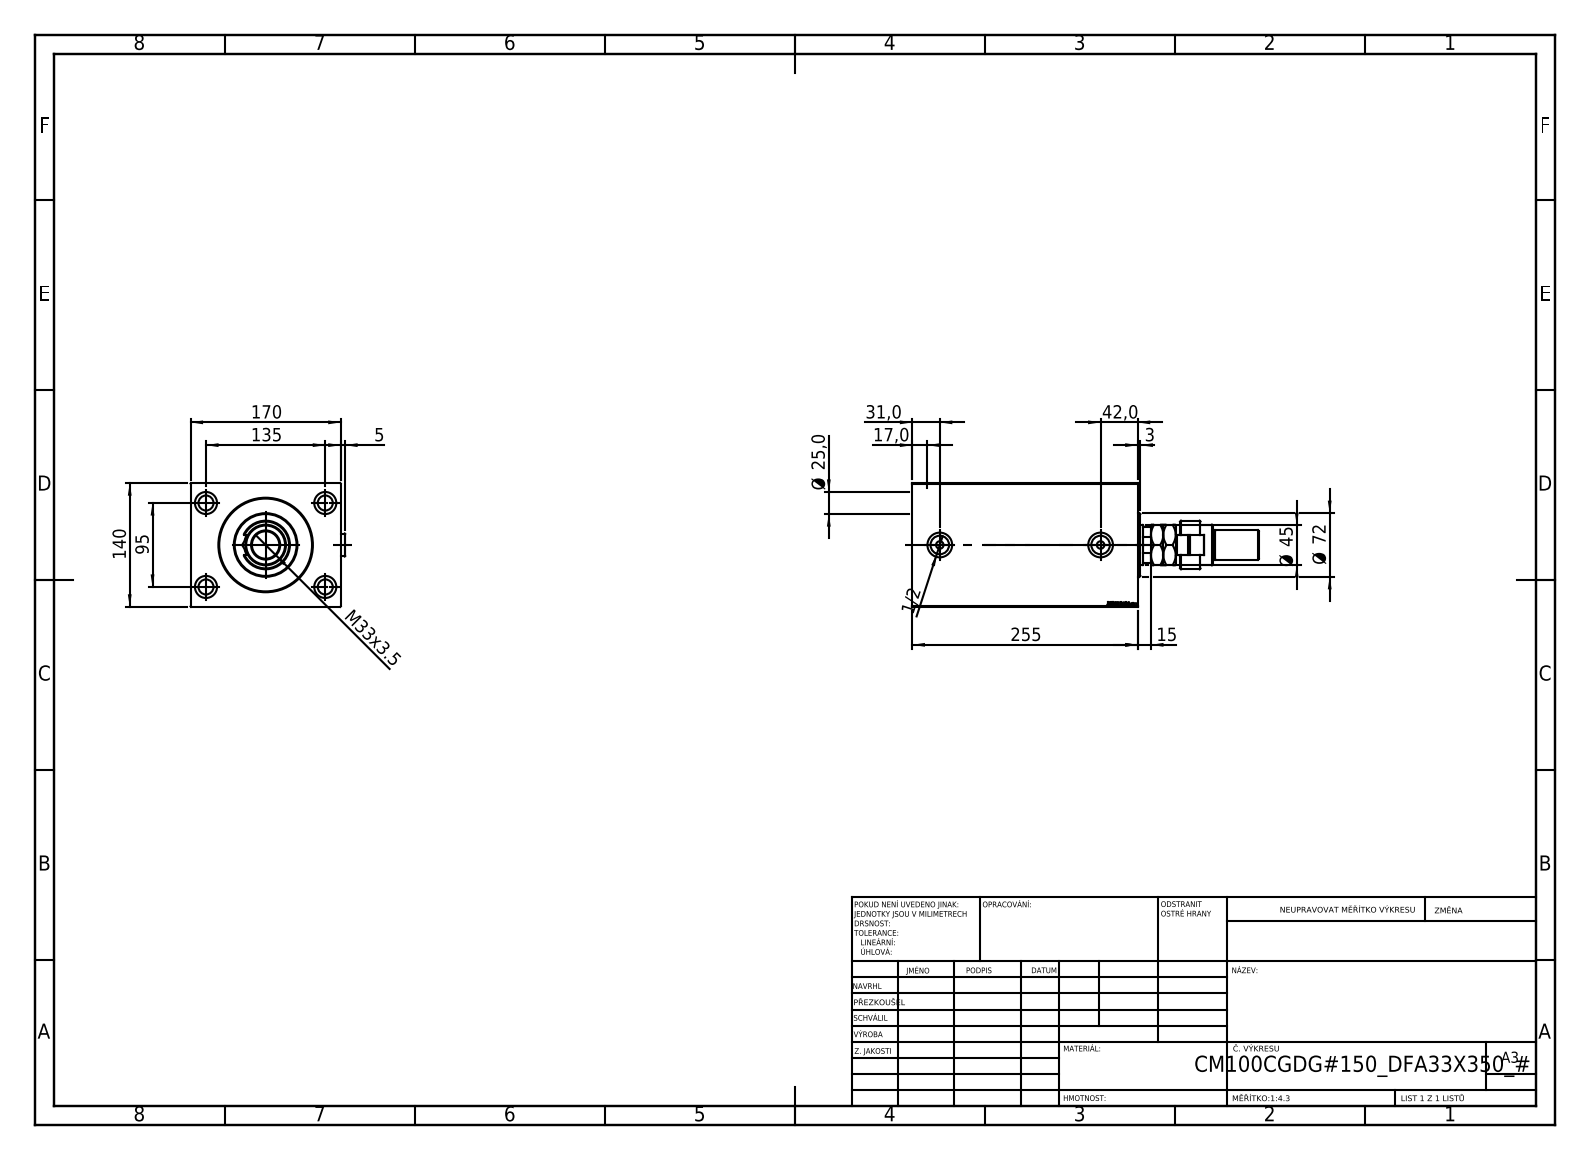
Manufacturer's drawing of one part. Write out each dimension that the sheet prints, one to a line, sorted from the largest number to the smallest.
255
170
140
135
95
Ø 72
Ø 45
42,0
M33x3.5
31,0
Ø 25,0
17,0
15
5
3
1/2
